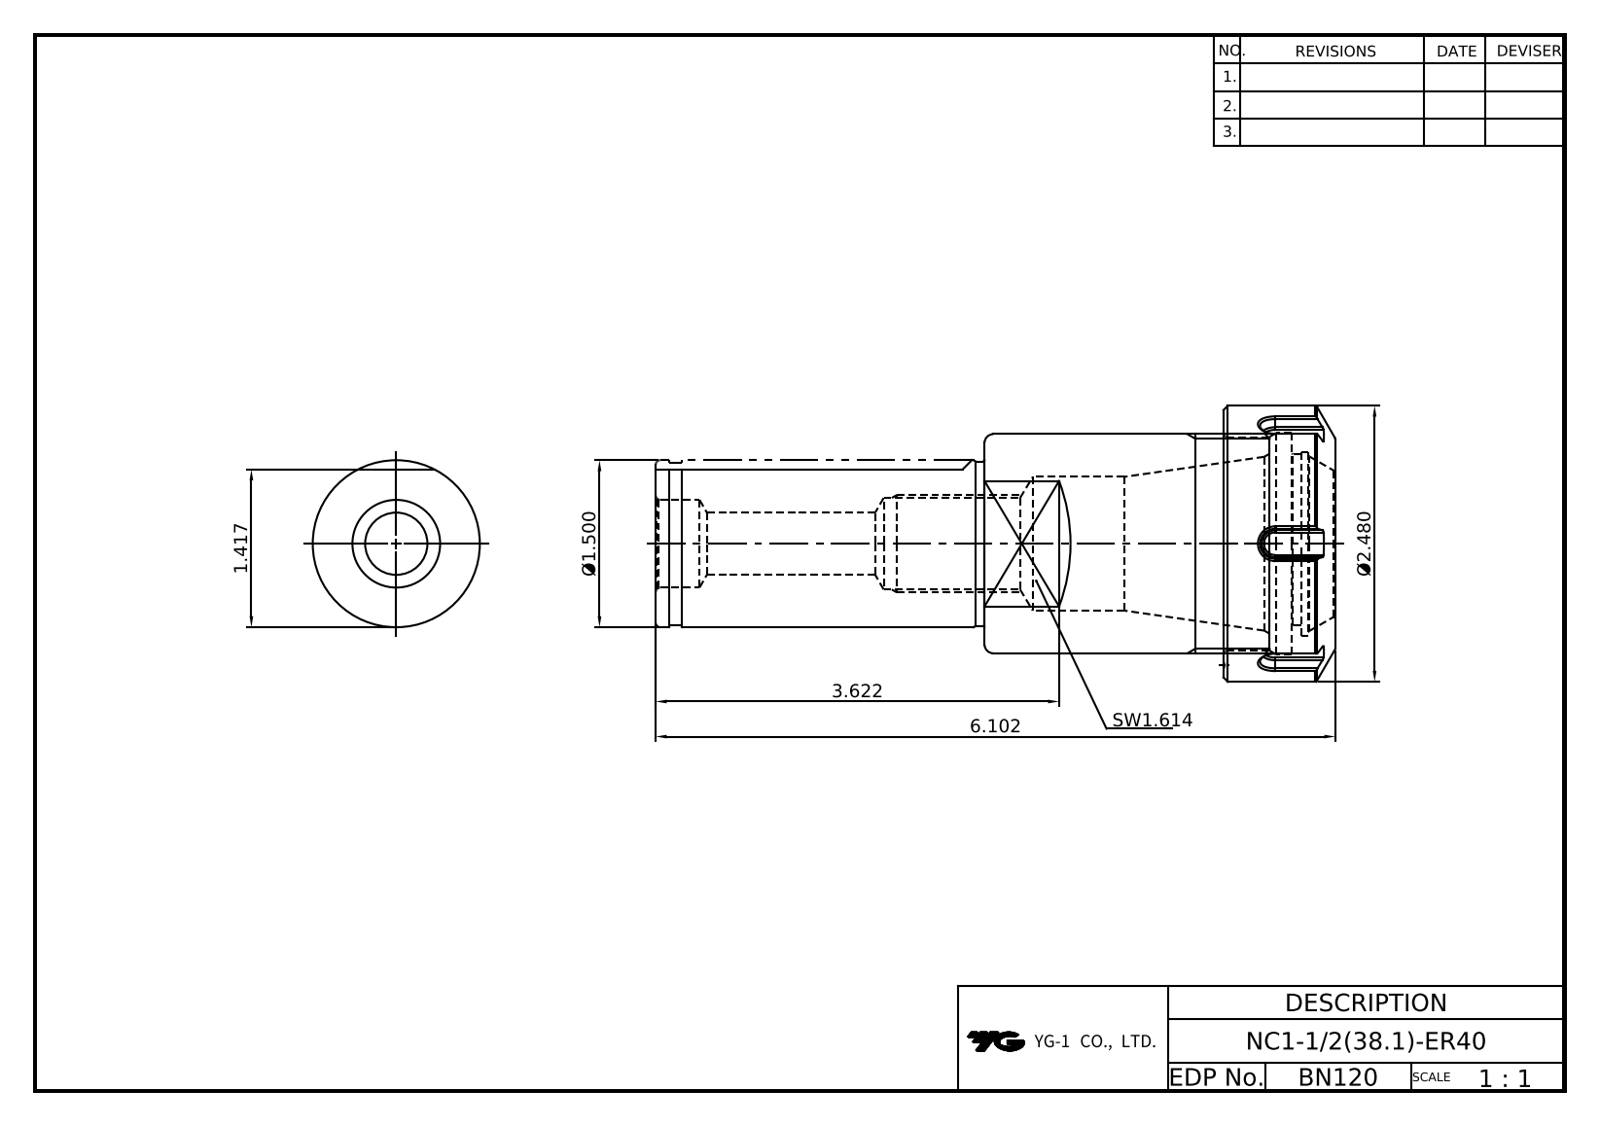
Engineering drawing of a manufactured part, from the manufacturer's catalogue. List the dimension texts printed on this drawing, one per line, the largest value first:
6.102
3.622
Ø2.480
Ø1.500
1.417
